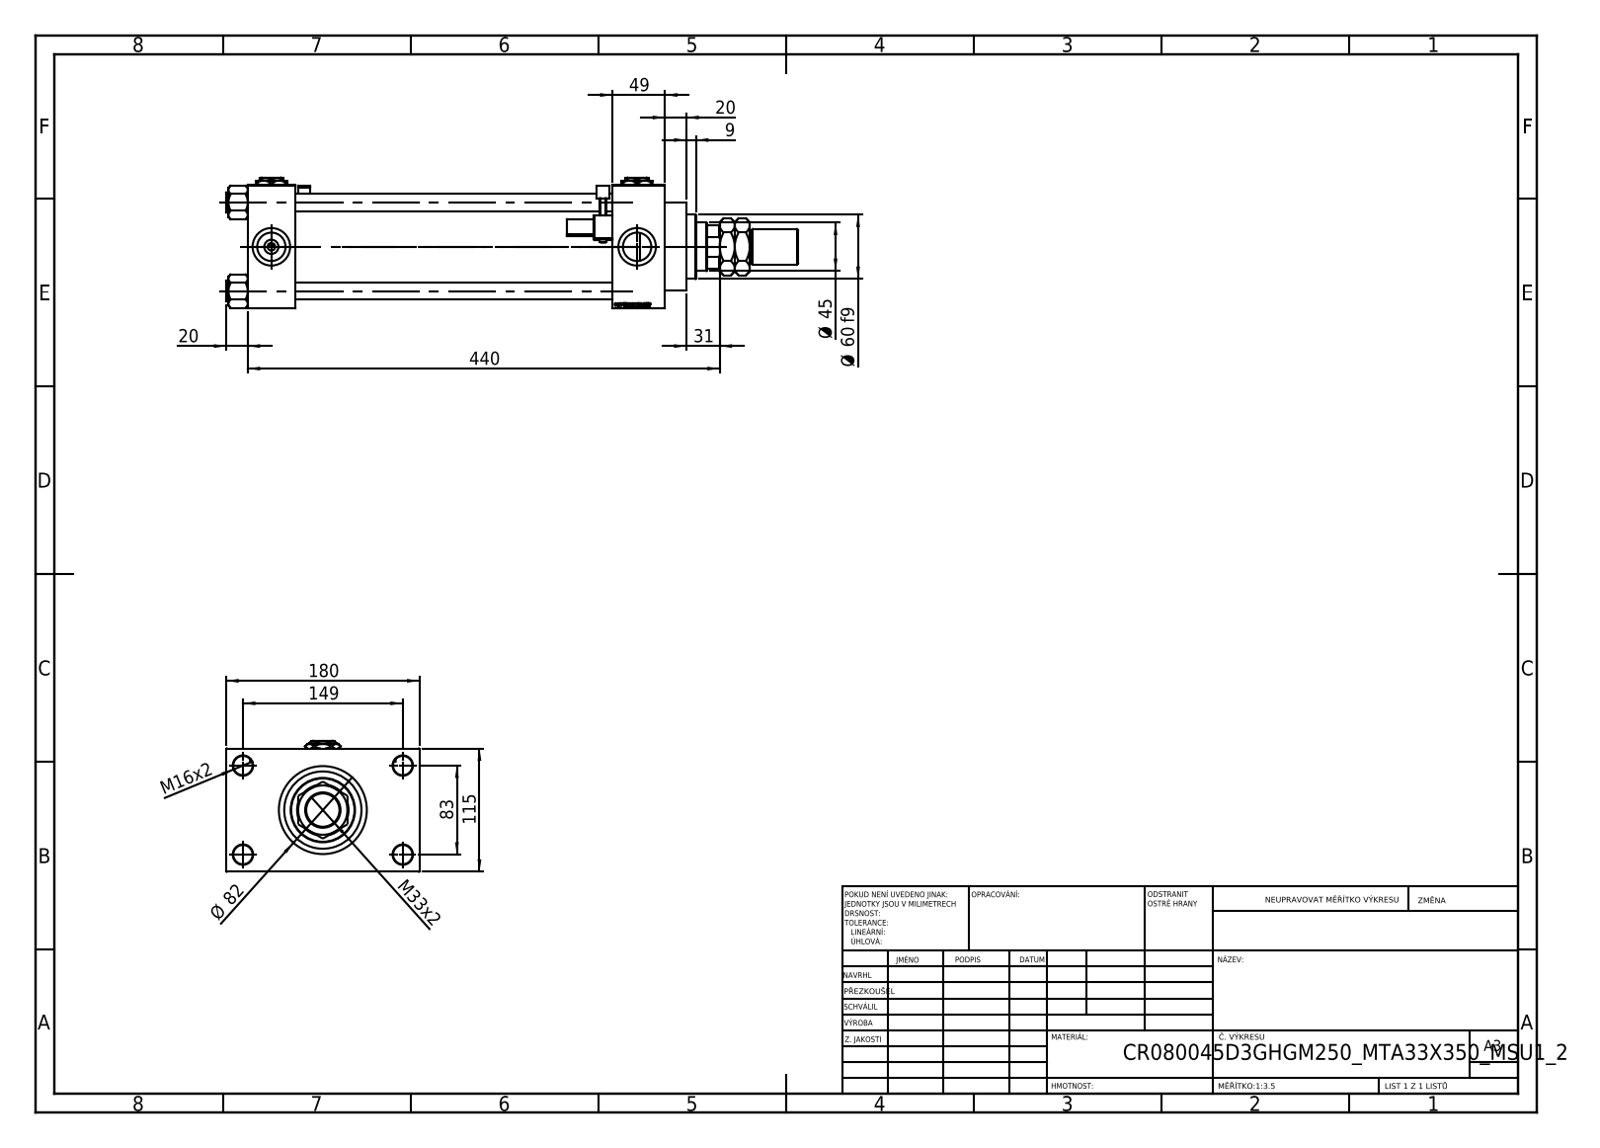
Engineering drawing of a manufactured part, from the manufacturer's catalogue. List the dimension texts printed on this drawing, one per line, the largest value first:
440
180
149
115
83
Ø 82
Ø 60 f9
49
Ø 45
M33x2
31
20
20
M16x2
9
